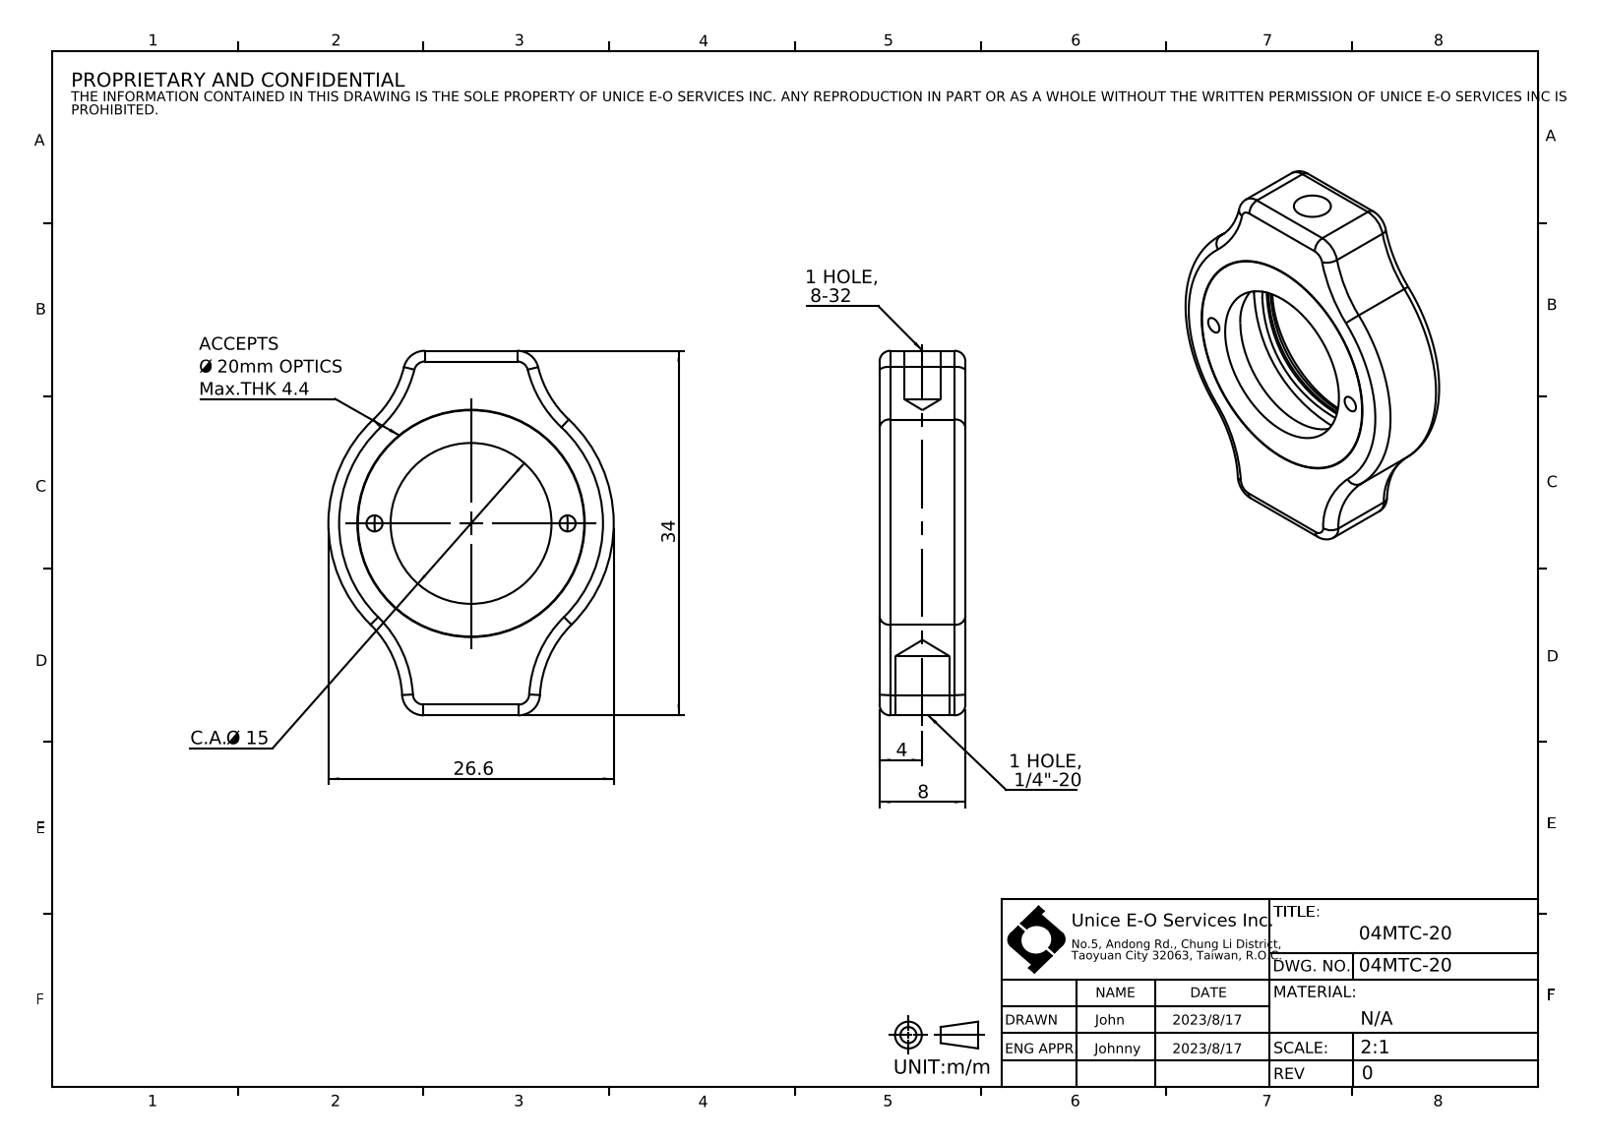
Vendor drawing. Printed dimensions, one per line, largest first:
34
26.6
C.A. Ø 15
8
4
